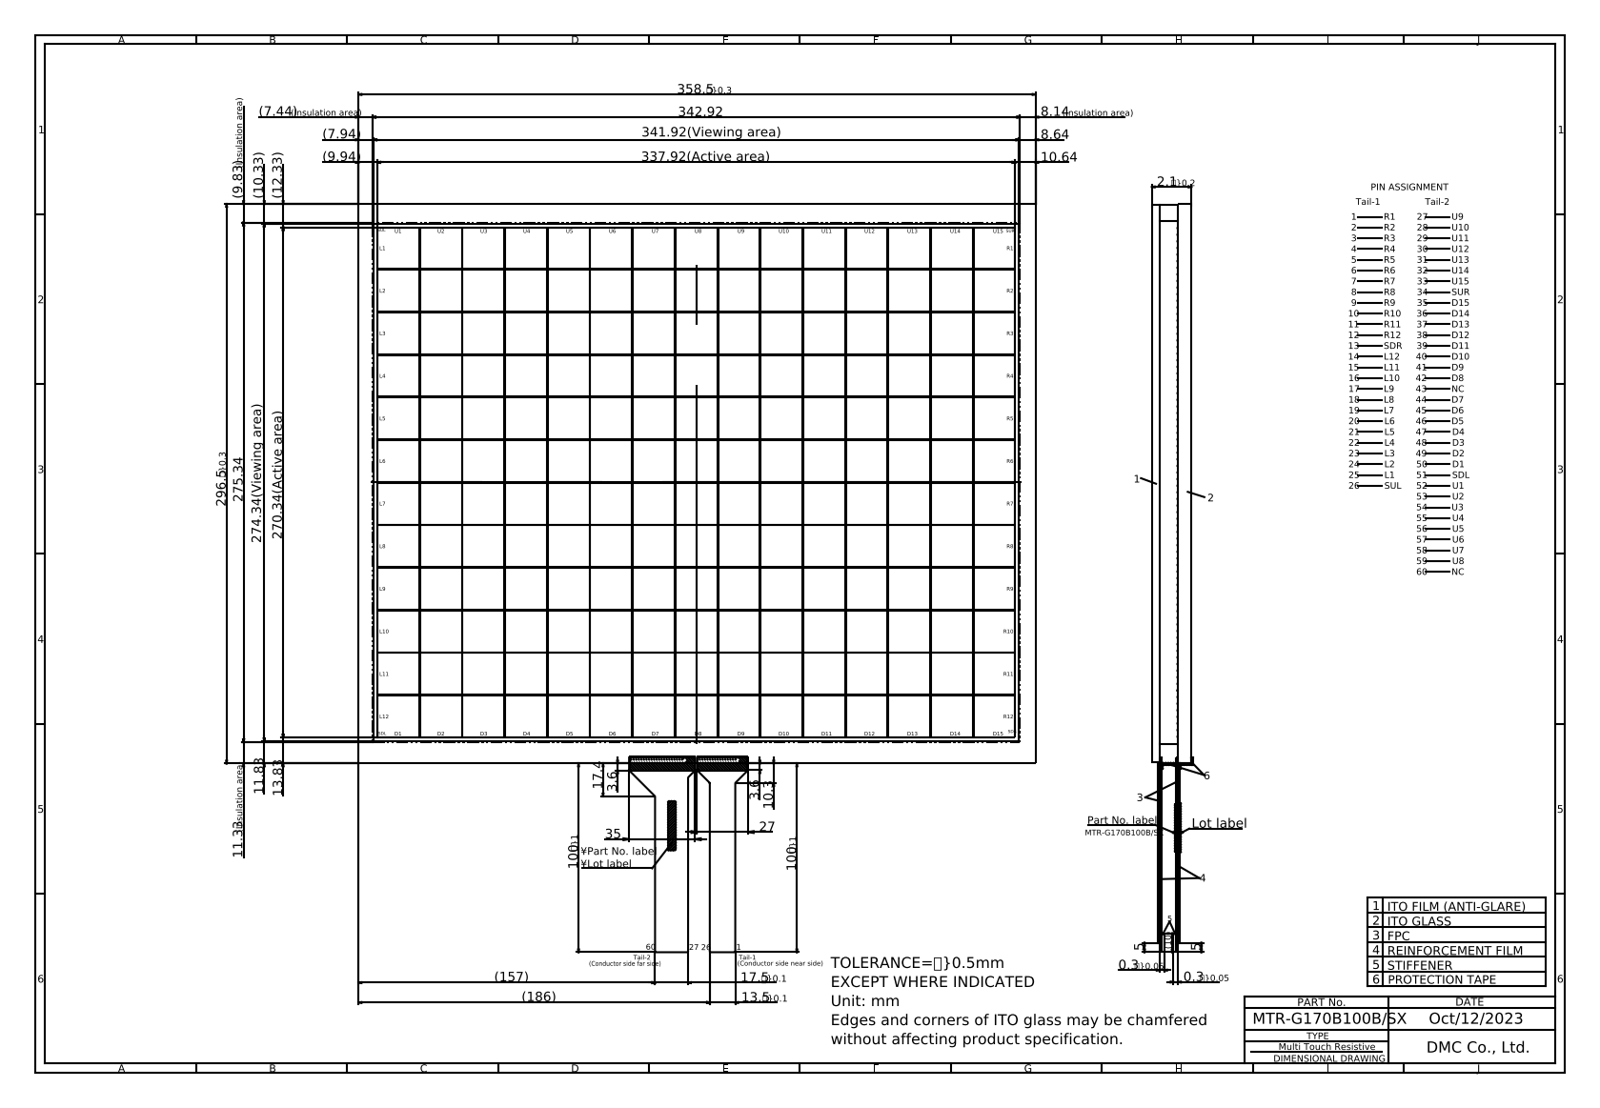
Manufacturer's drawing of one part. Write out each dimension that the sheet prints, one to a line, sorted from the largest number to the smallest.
358.50
342.92
341.92(Viewing area)
337.92(Active area)
296.50
275.34
274.34(Viewing area)
270.34(Active area)
(186)
(157)
100.00
100.00
35
27
17.50
17.4
13.83
13.50
(12.33)
11.83
11.33{\H0.6667x;(Insulation area)}
10.64
(10.33)
10.3
(10)
(9.94)
(9.83){\H0.6667x;(Insulation area)}
8.64
8.14{\H0.6667x;(Insulation area)}
(7.94)
(7.44){\H0.6667x;(Insulation area)}
5
5
3.6
3.6
2.1{\H0.6667x;?}0.2}
0.3{\H0.6667x;?}0.05}
0.3{\H0.6667x;?}0.05}
